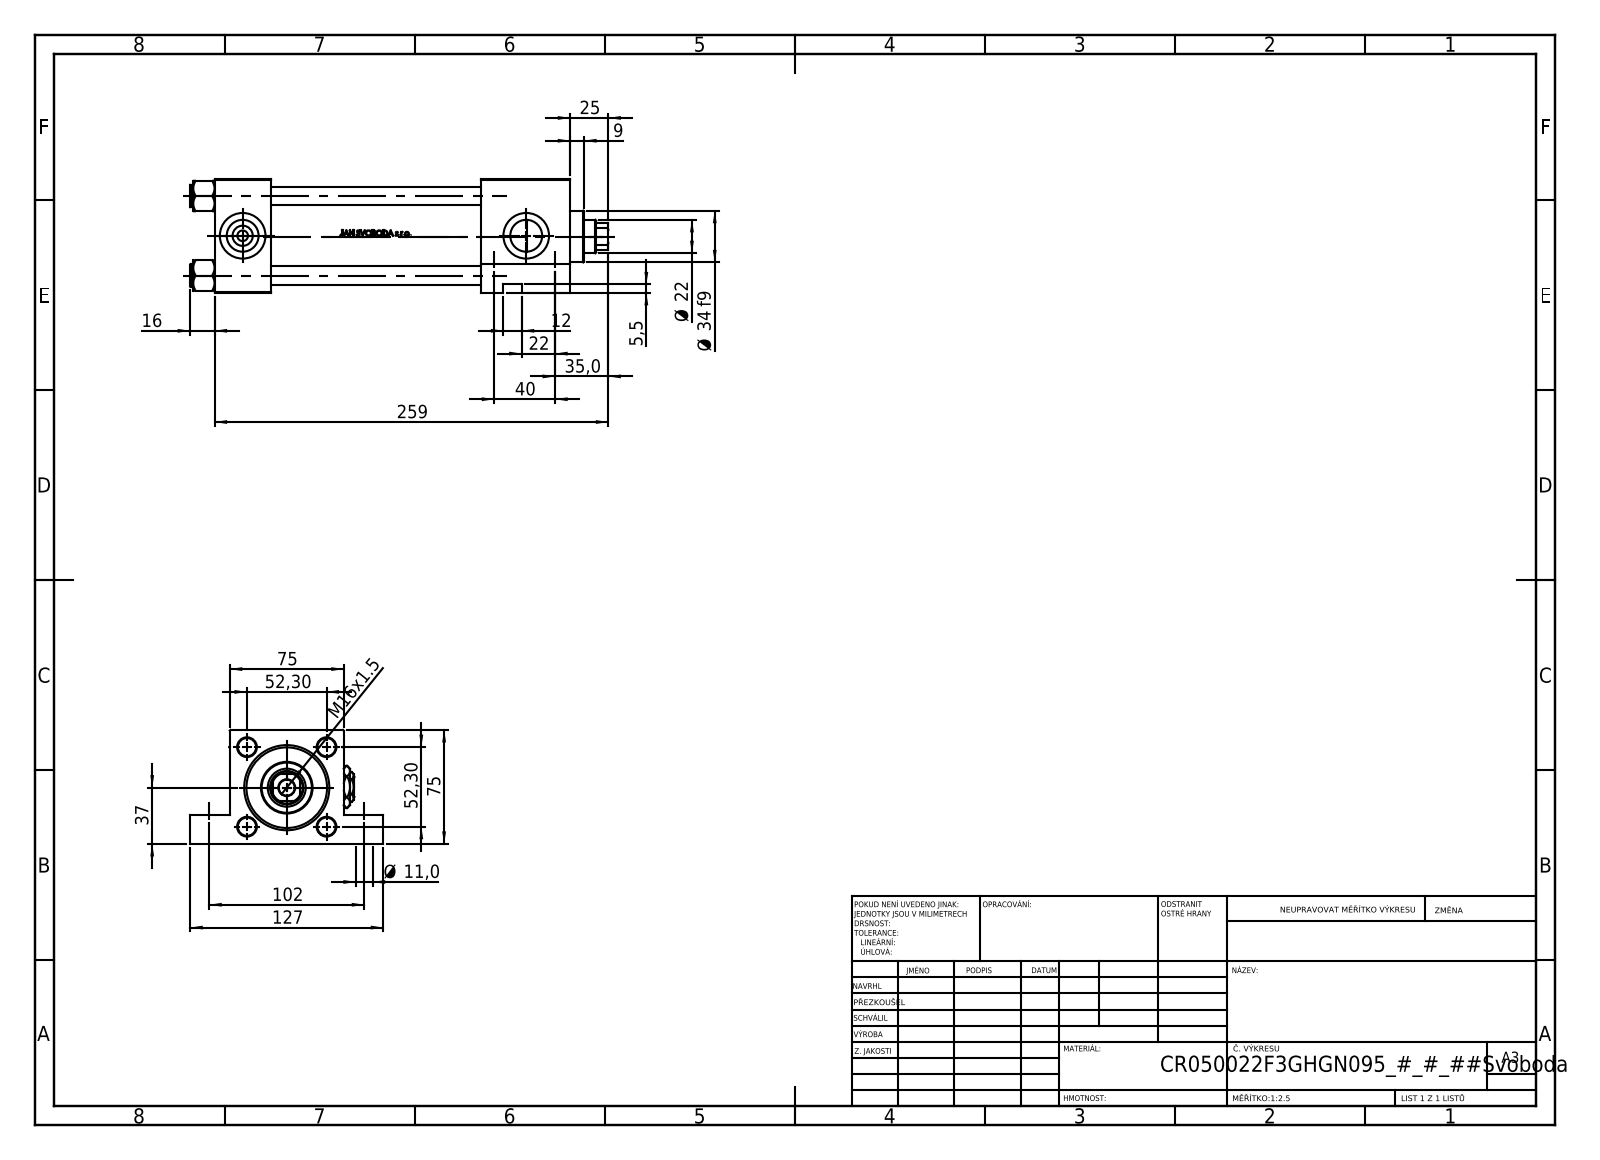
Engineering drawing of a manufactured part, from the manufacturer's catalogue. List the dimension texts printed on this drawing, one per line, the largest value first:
259
127
102
75
75
52,30
52,30
40
37
35,0
Ø 34 f9
25
Ø 22
22
16
M16x1.5
12
Ø 11,0
9
5,5
